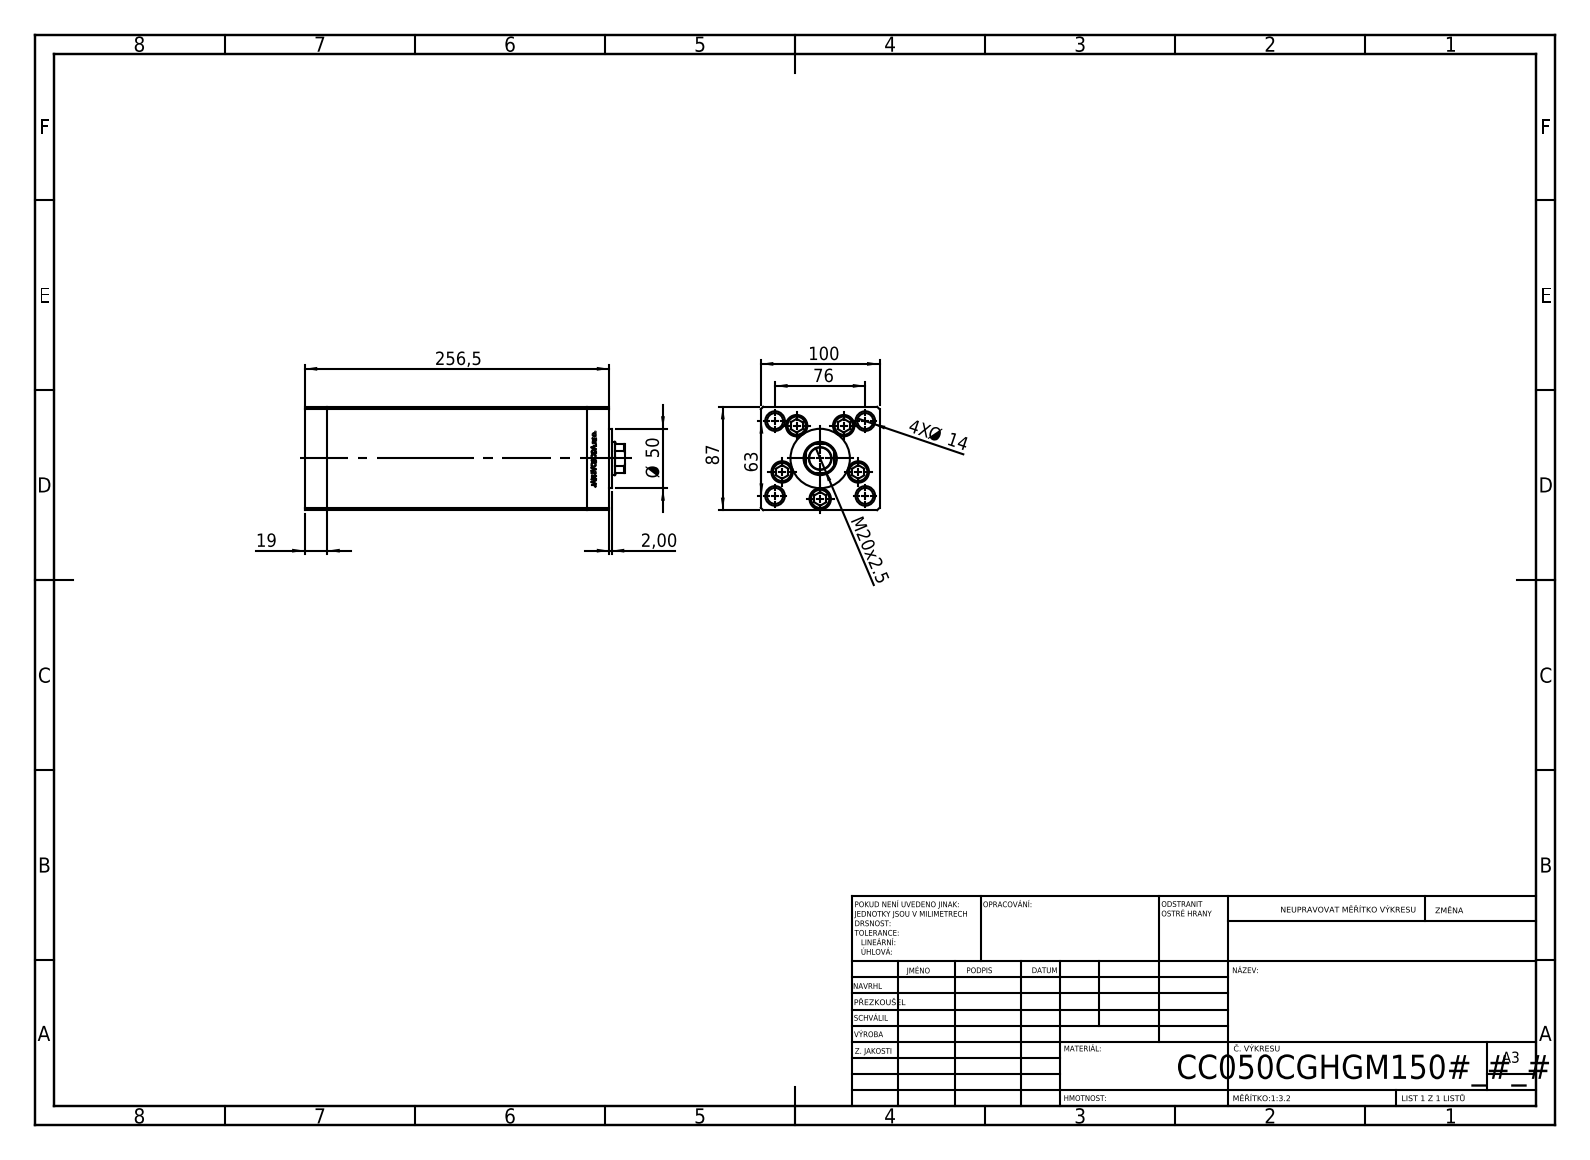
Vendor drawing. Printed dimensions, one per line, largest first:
256,5
100
87
76
63
Ø 50
M20x2.5
19
4X Ø 14
2,00
